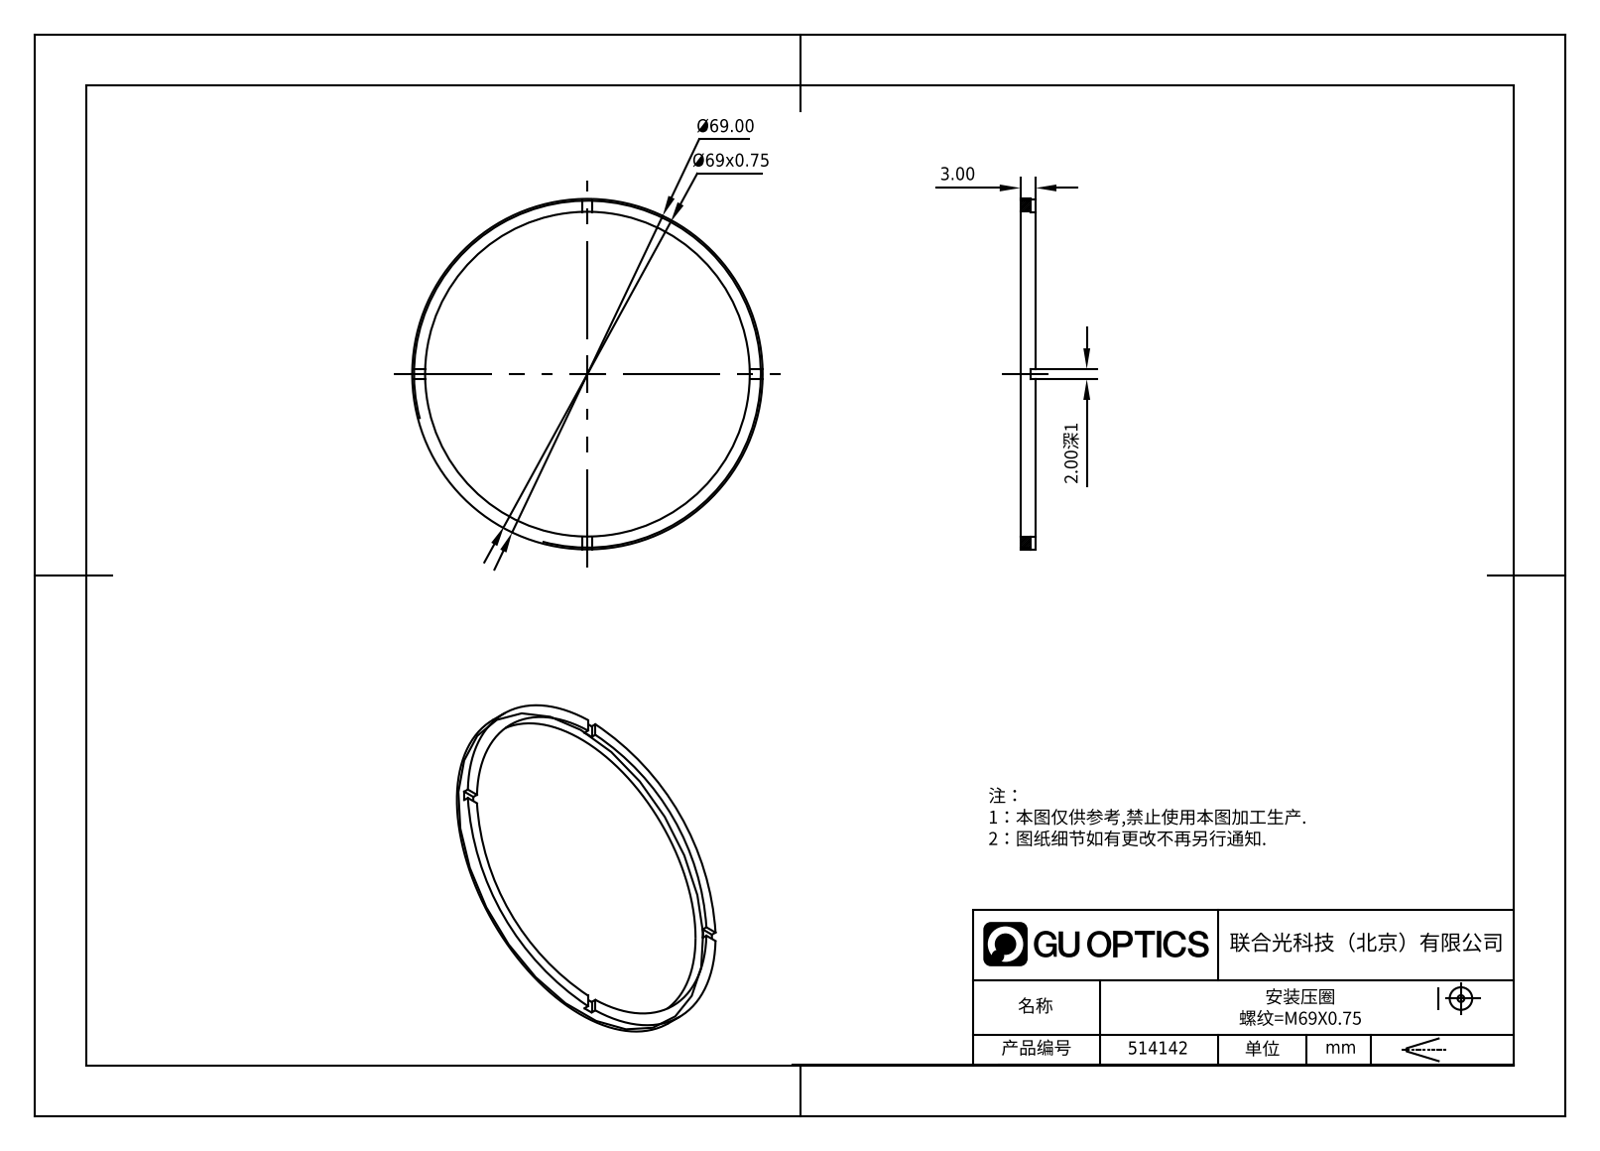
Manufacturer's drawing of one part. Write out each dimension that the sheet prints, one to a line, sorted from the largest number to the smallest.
Ø69.00
Ø69x0.75
3.00
2.00深1
